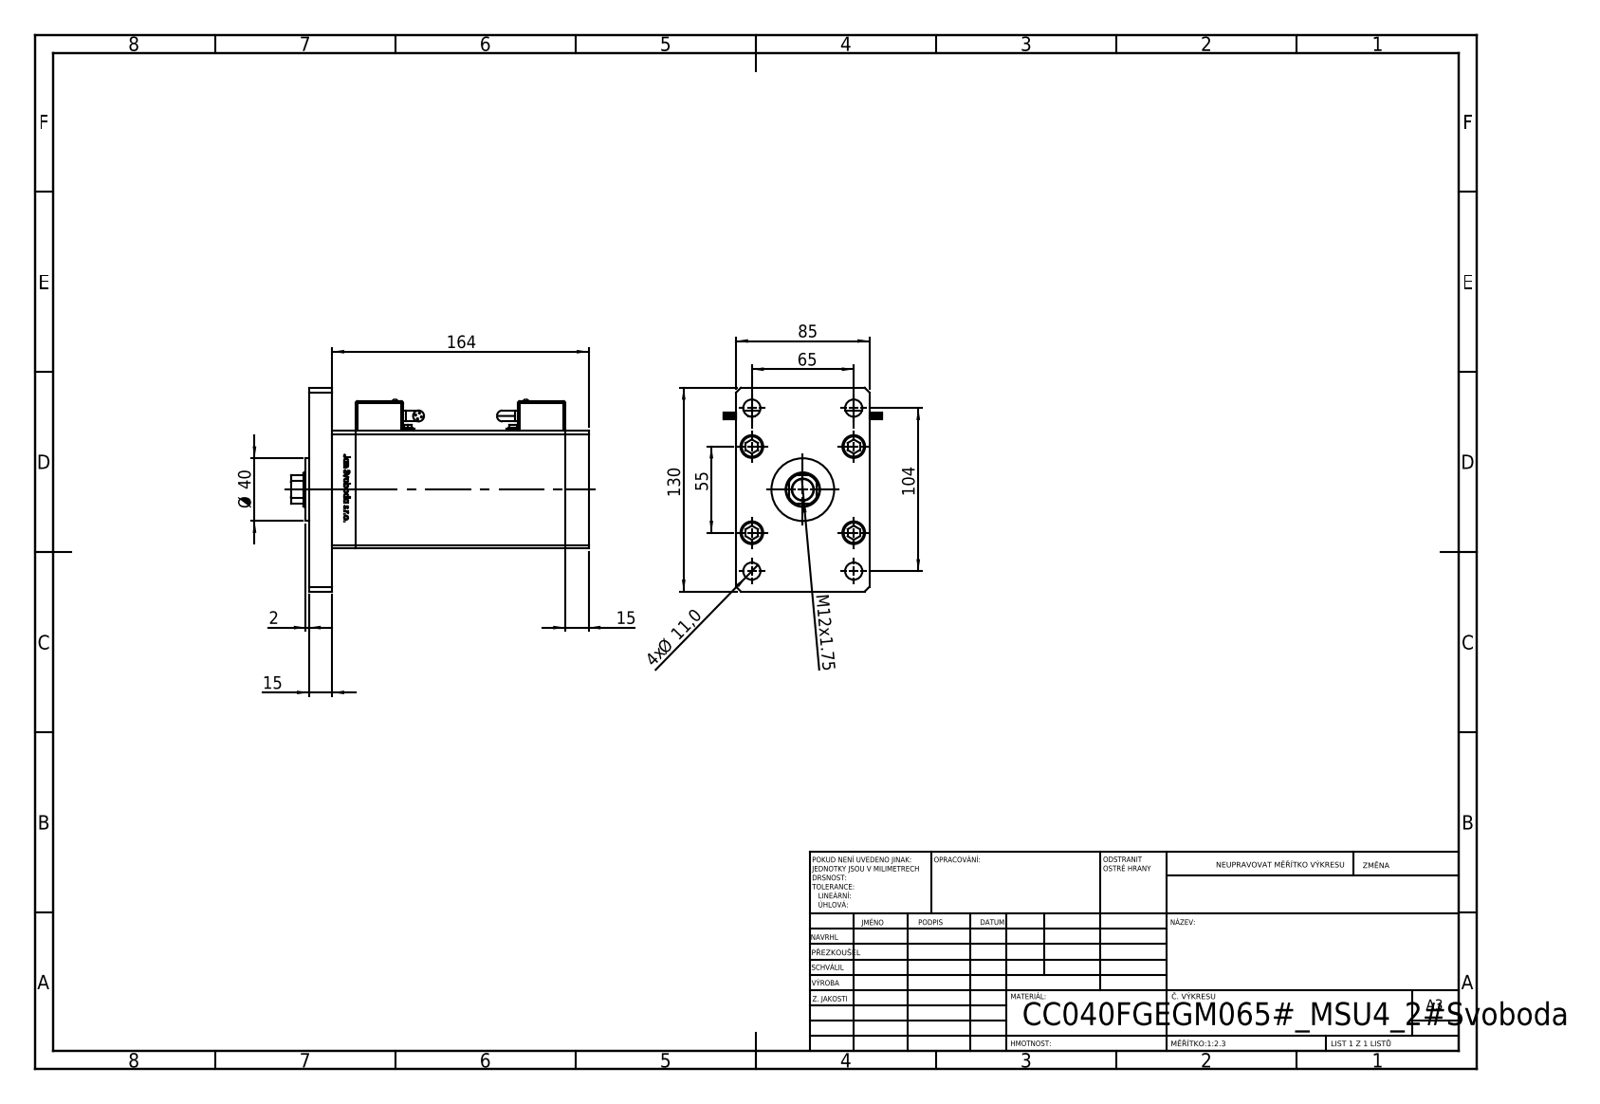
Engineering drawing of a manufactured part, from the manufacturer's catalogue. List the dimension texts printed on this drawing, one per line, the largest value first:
164
130
104
85
65
55
Ø 40
15
15
M12x1.75
4x Ø 11,0
2
